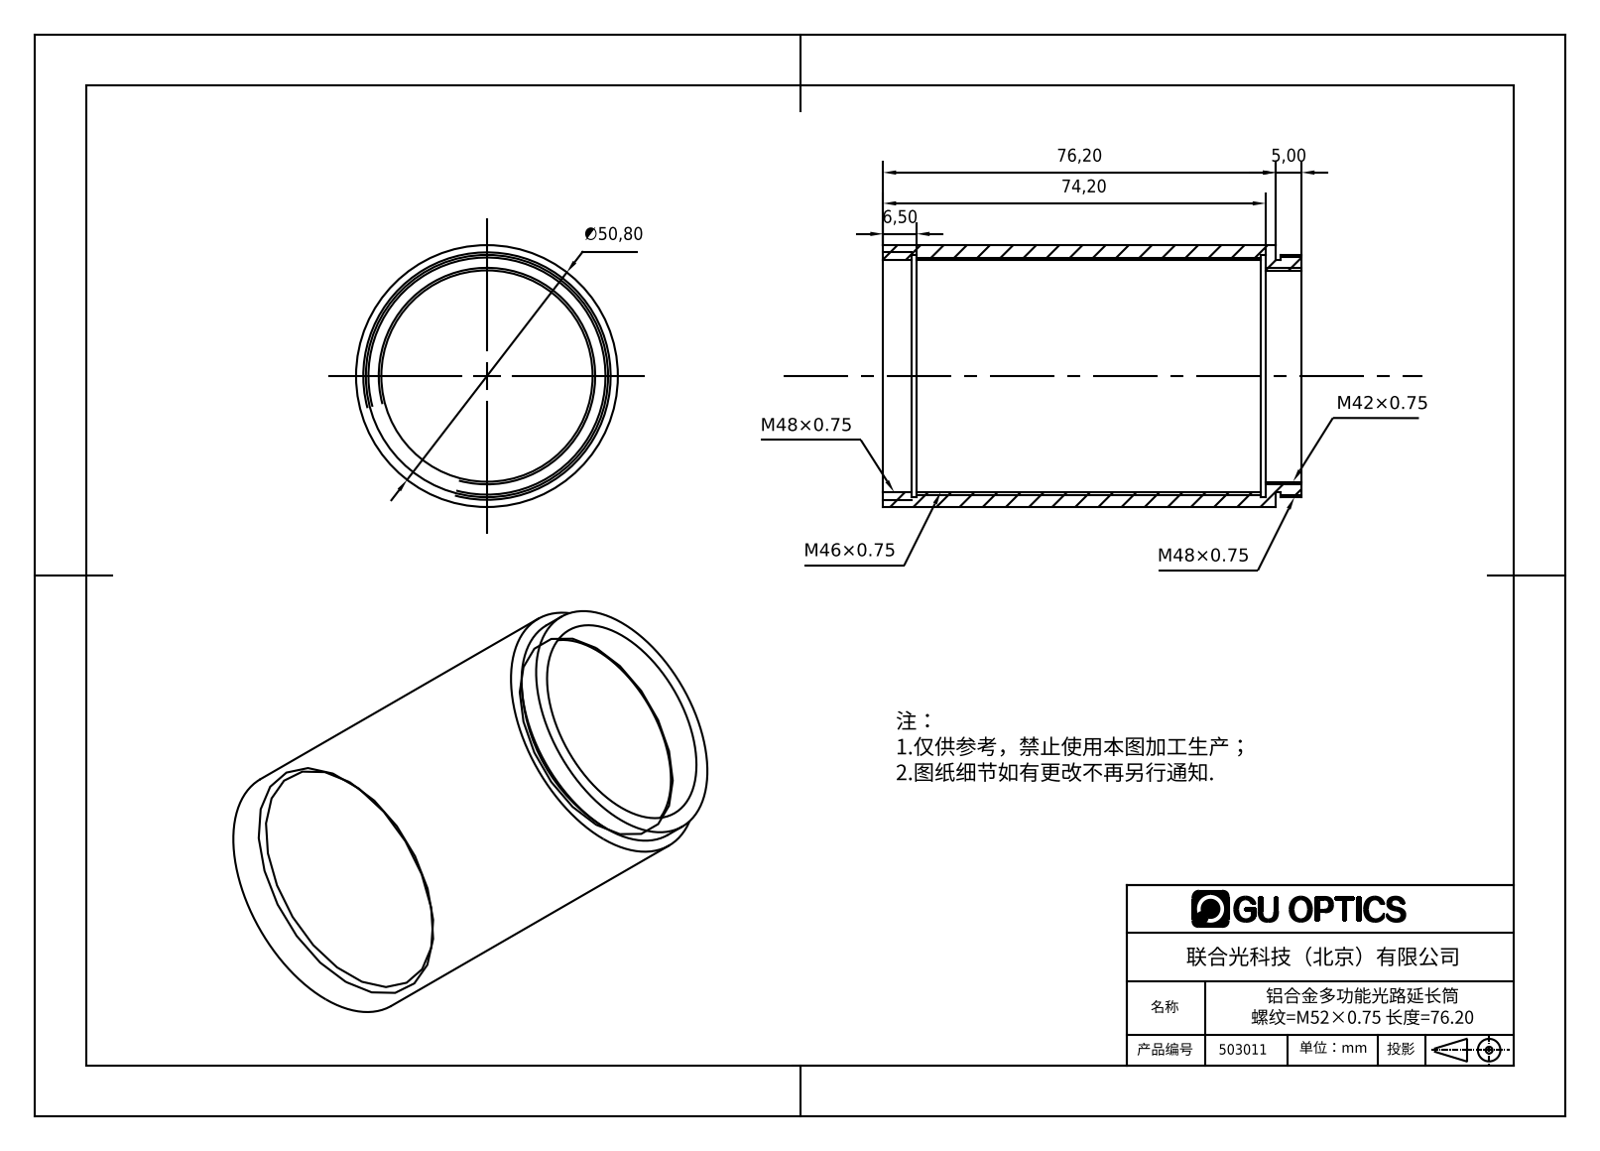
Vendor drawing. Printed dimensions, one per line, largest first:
76,20
74,20
∅50,80
6,50
5,00
